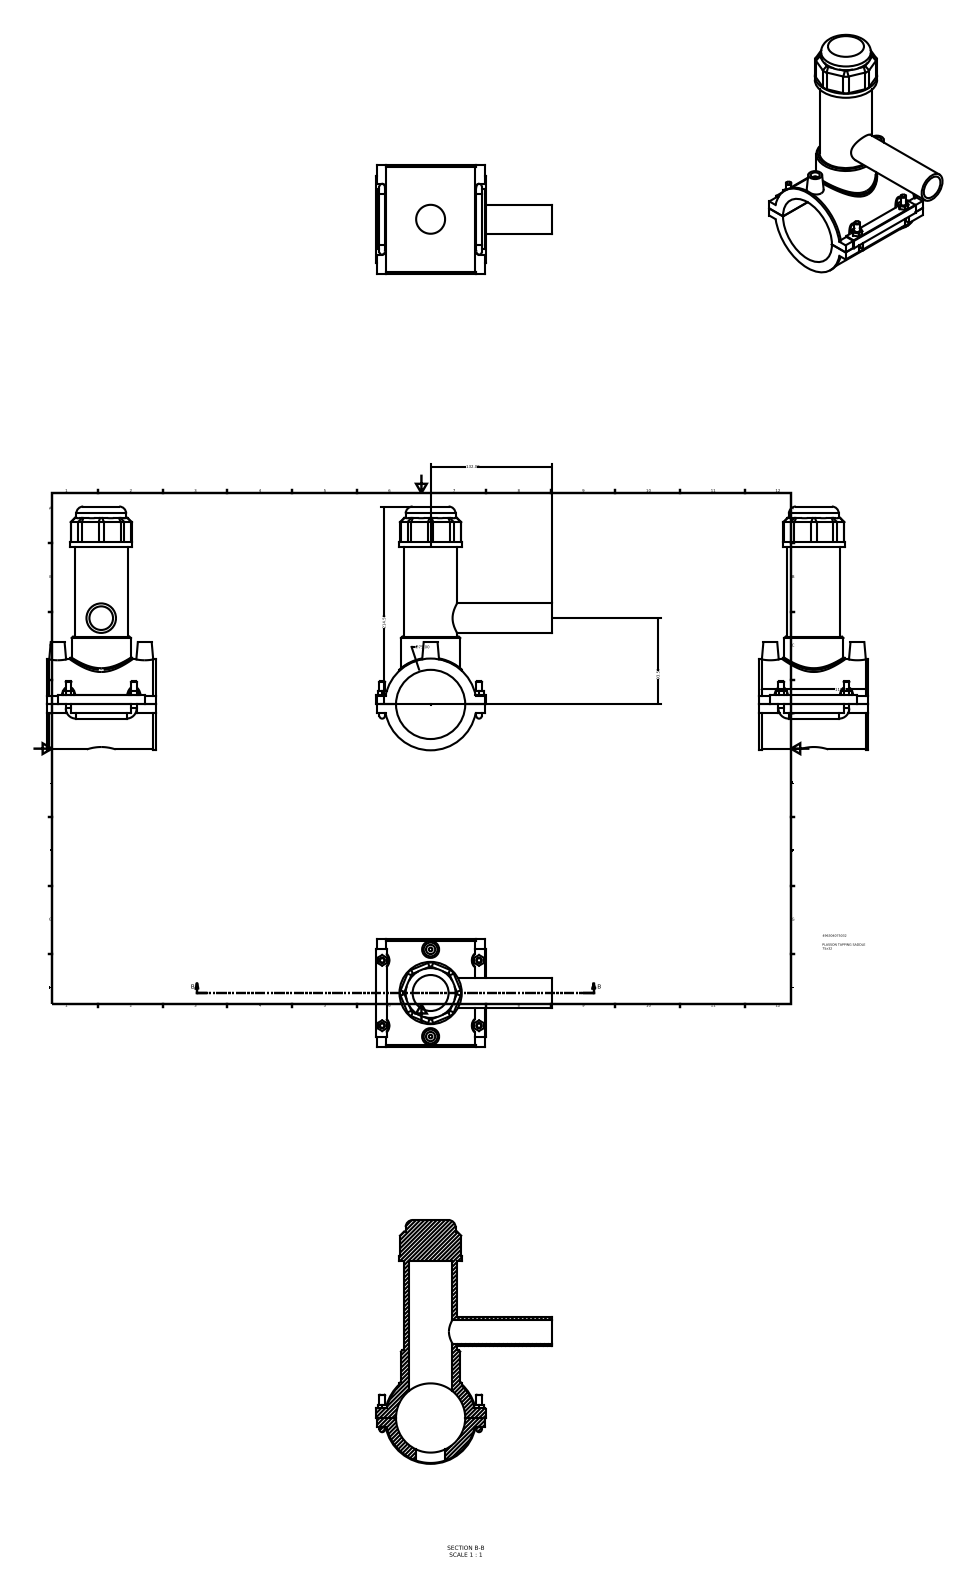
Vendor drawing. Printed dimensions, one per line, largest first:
214.50
132.00
118.00
93.50
∅75.00
